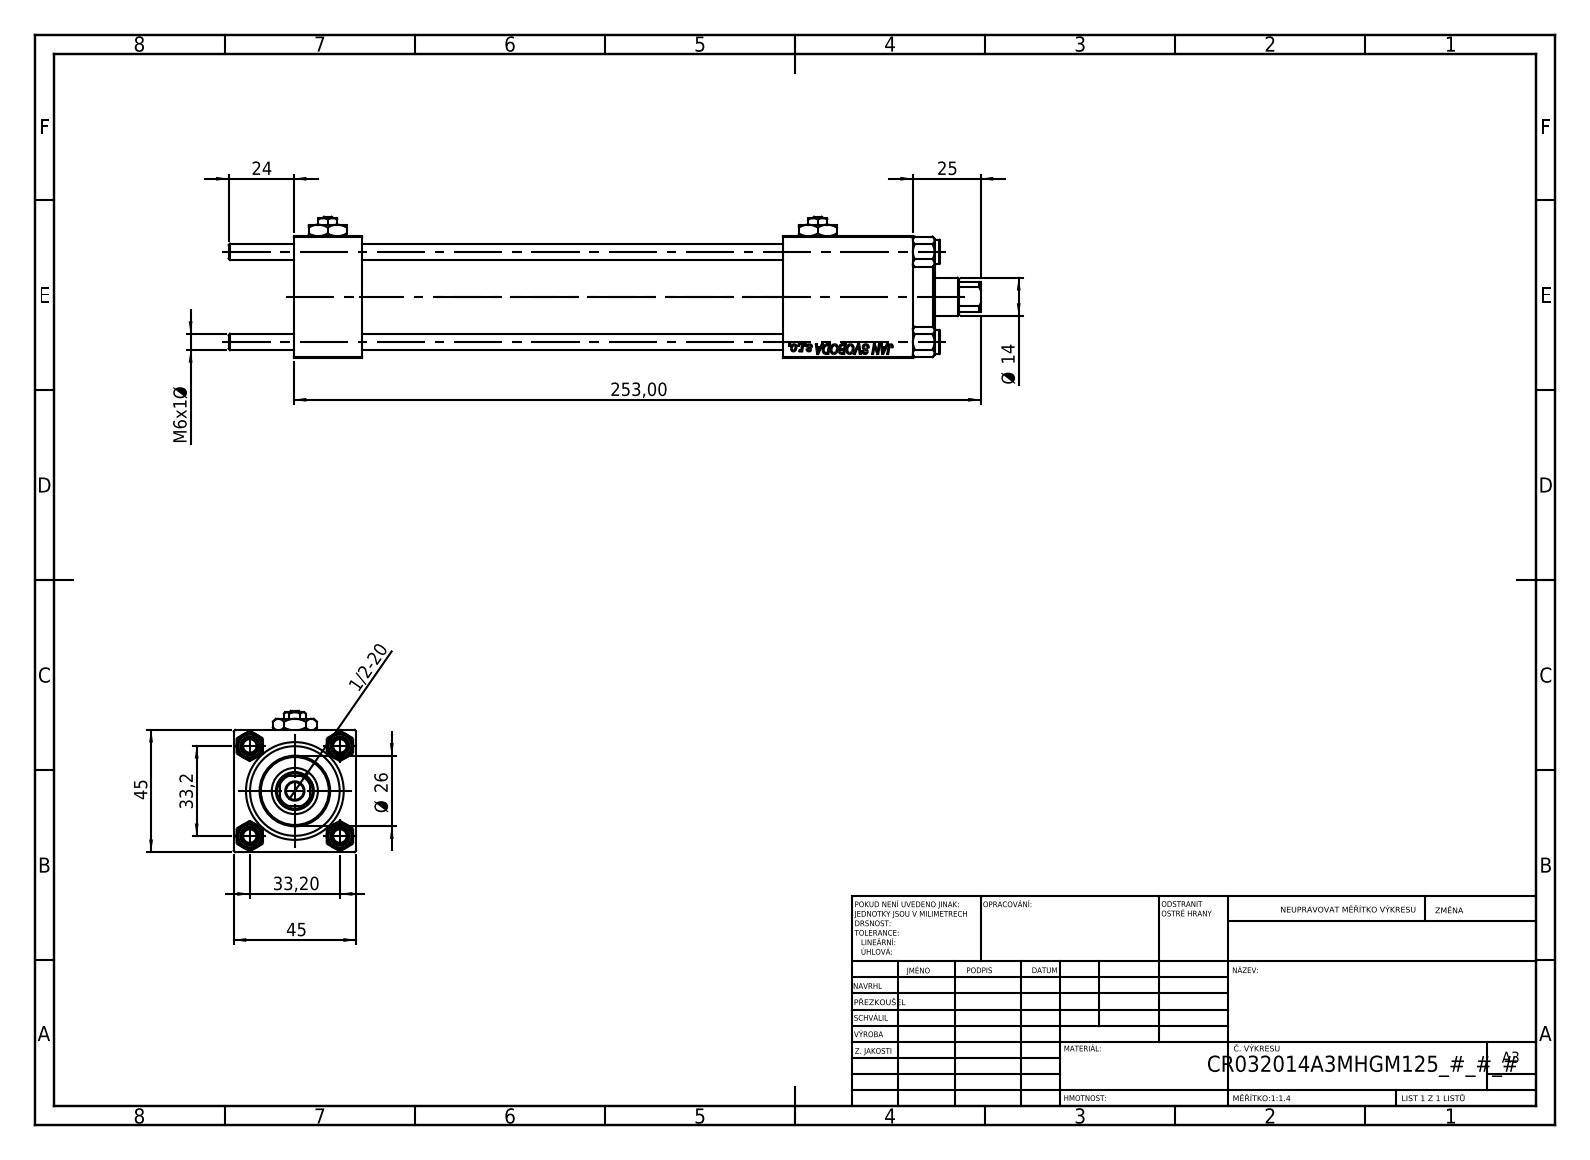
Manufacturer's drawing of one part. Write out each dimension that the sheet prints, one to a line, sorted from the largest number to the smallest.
253,00
45
45
33,2
33,20
Ø 26
25
24
Ø 14
M6x1 Ø
1/2-20
